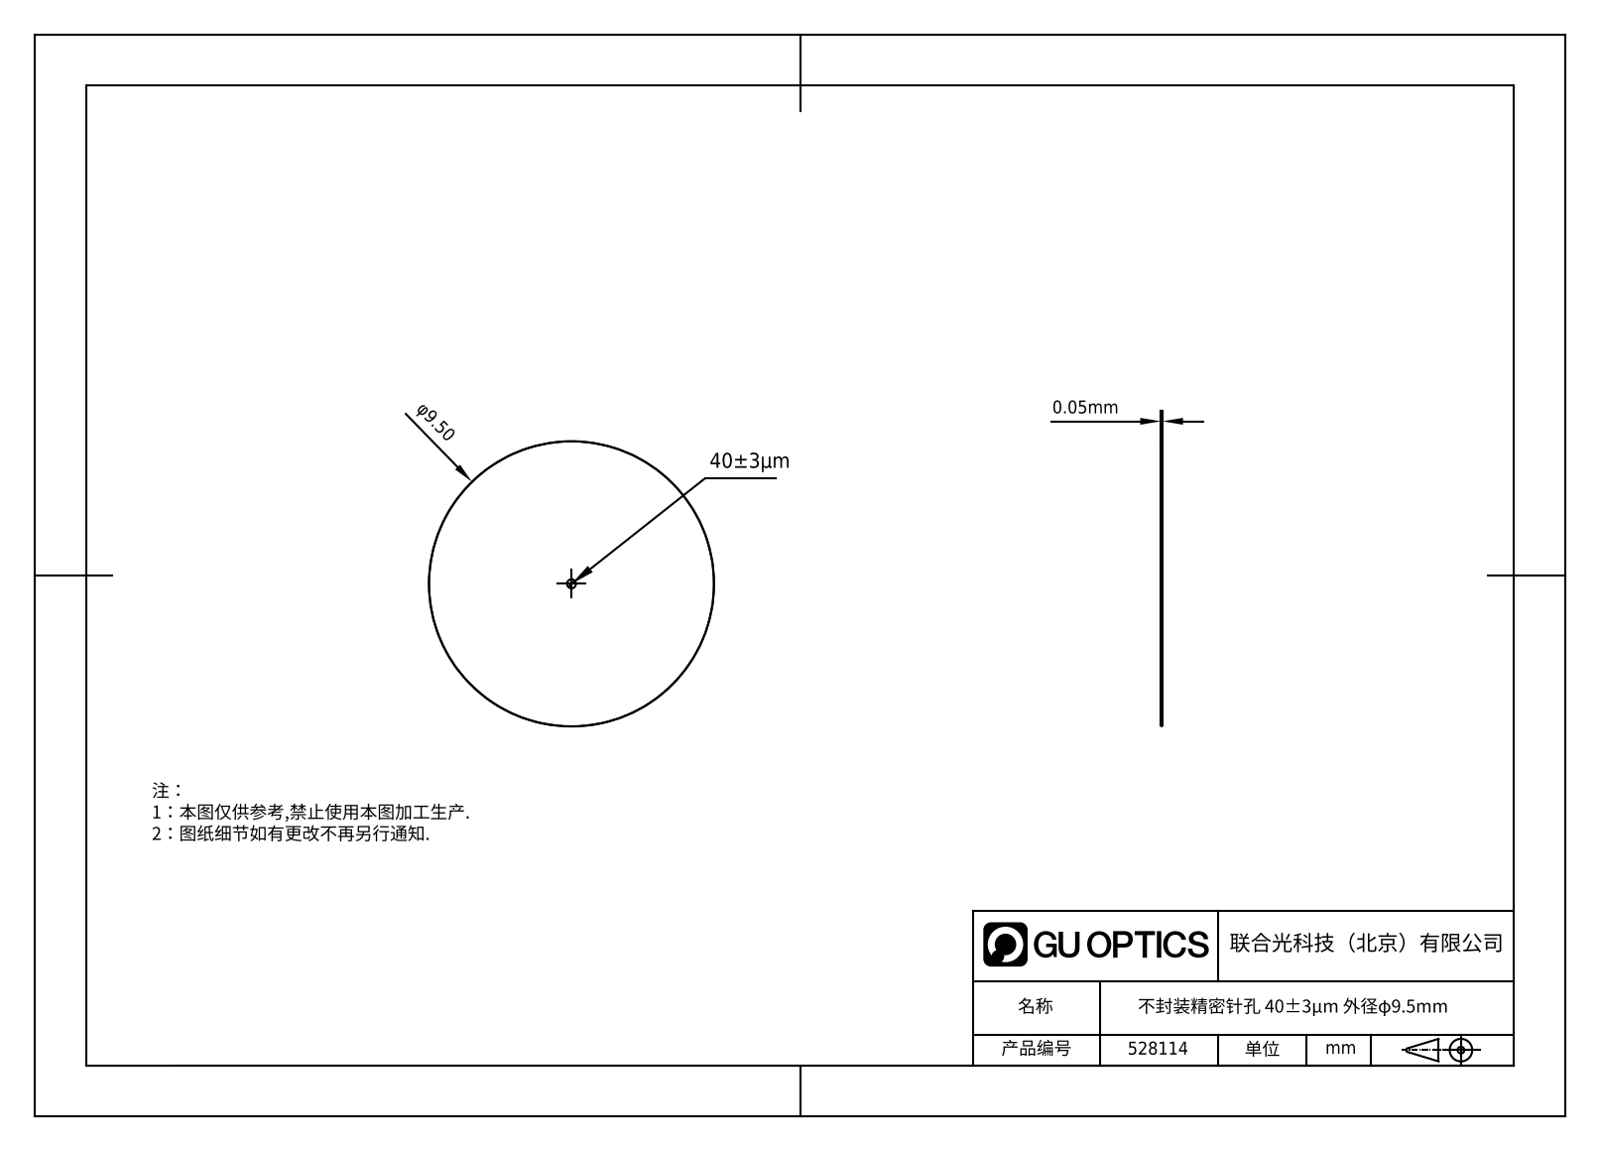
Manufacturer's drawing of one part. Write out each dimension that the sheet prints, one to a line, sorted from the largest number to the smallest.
φ9.50
0.05mm
